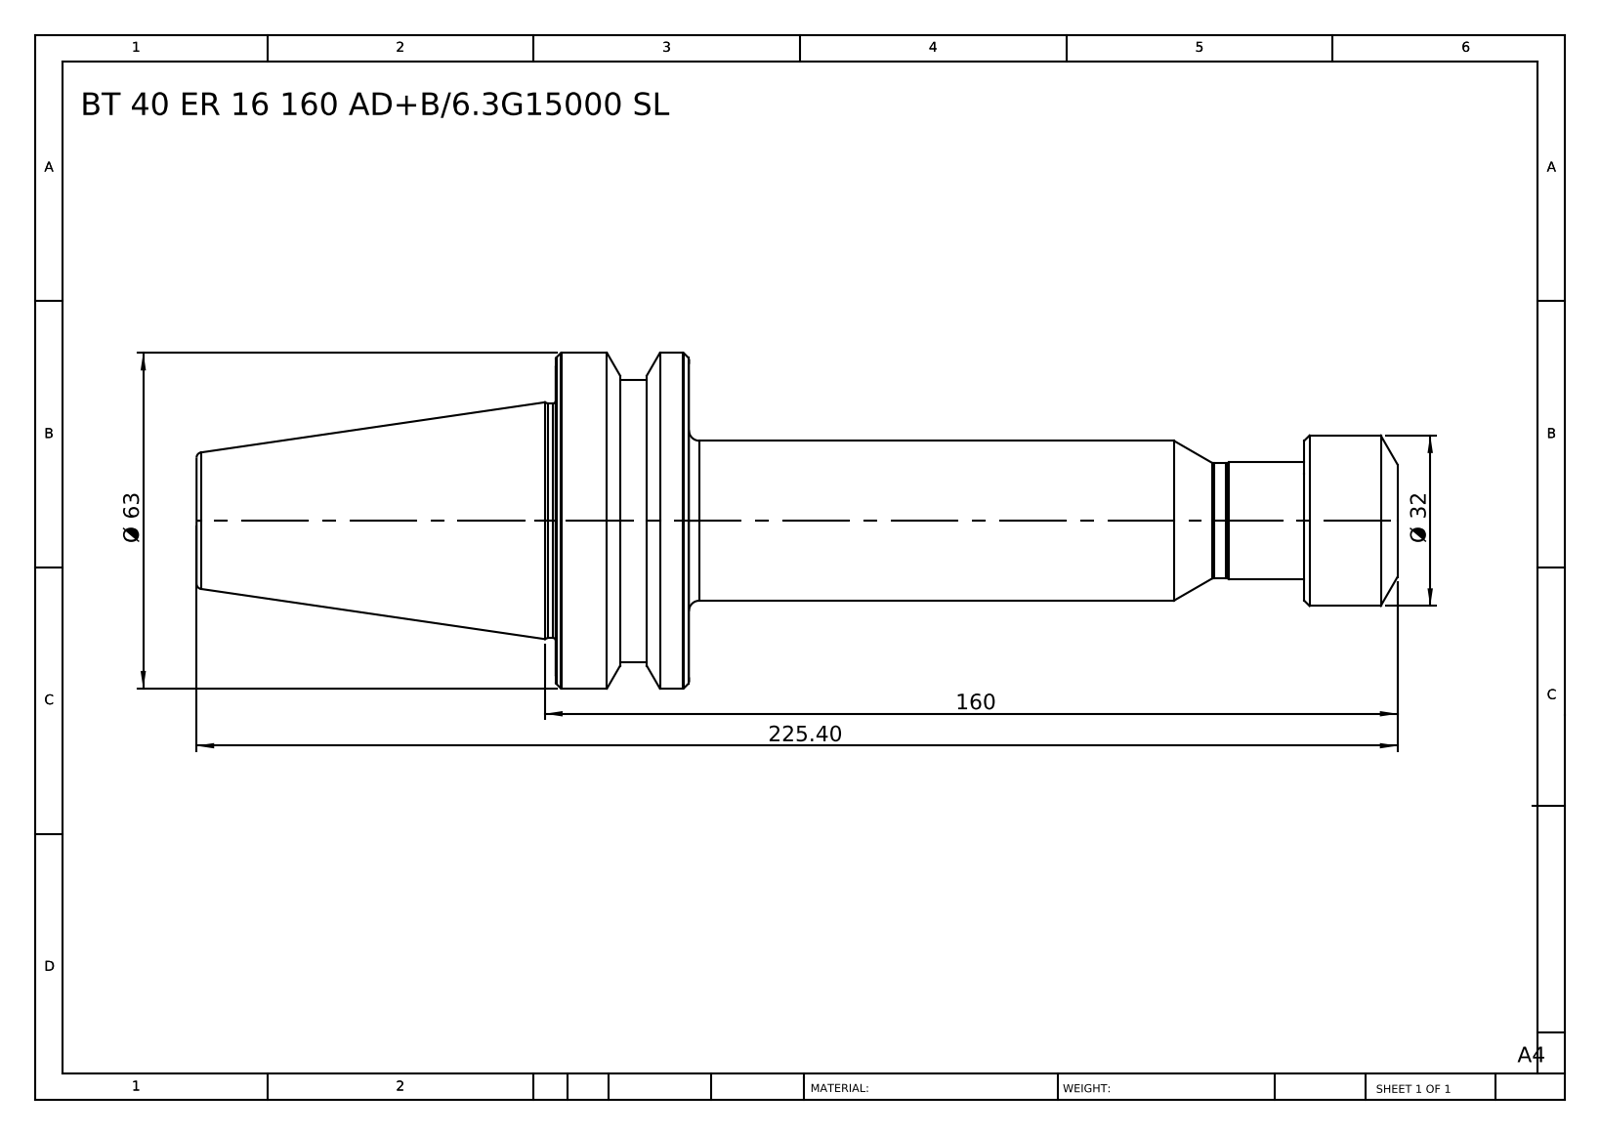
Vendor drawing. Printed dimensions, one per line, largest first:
225.40
160
Ø 63
Ø 32
